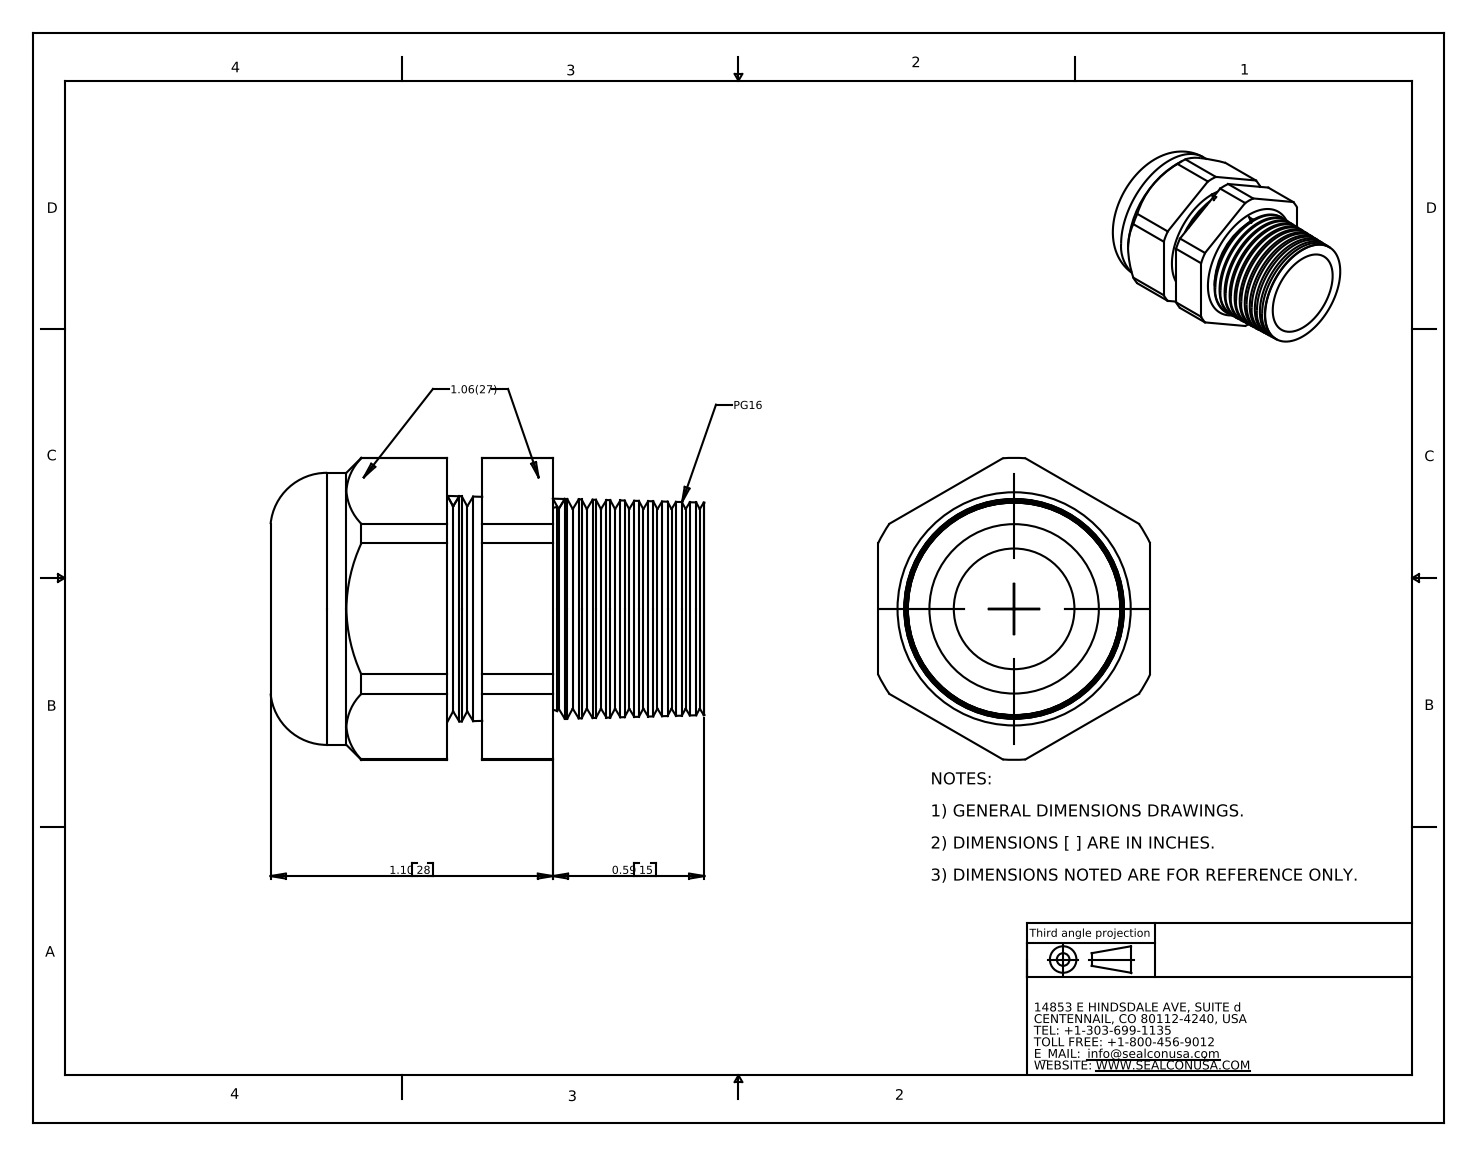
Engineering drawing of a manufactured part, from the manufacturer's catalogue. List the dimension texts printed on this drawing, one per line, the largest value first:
1.10 28
0.59 15
